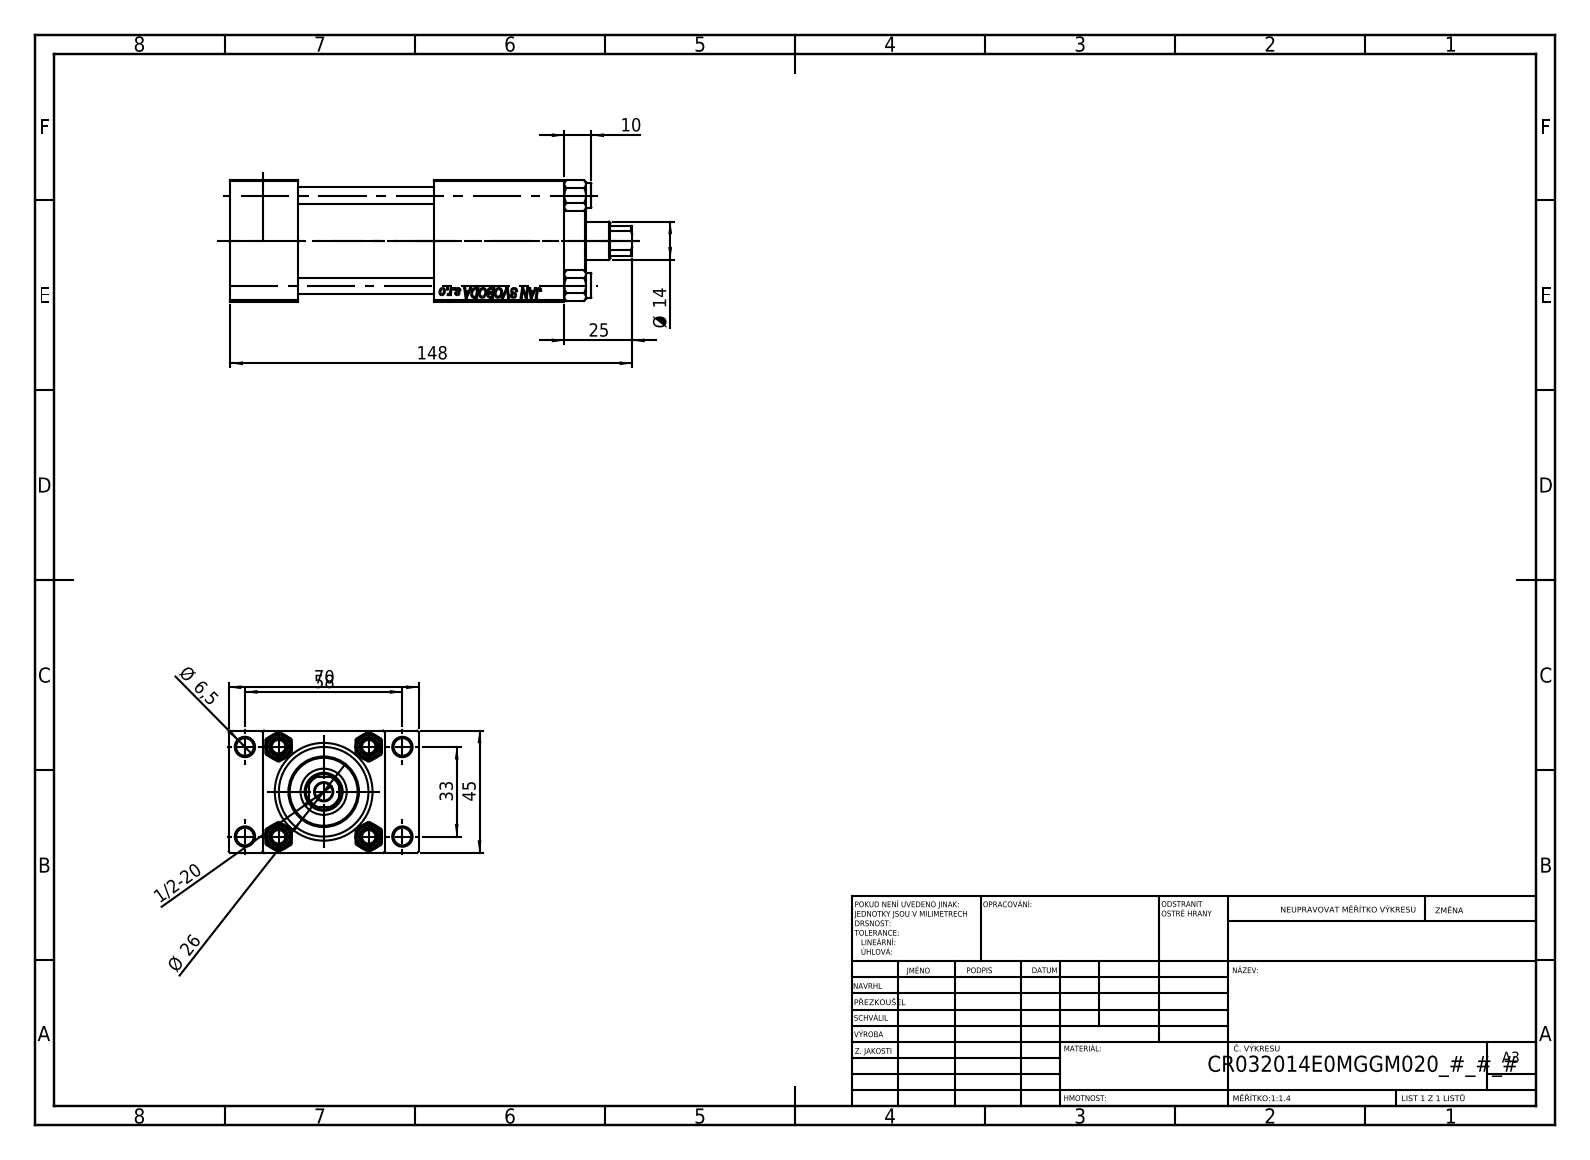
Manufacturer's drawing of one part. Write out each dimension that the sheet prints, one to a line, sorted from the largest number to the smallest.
148
70
58
45
33
Ø 26
25
Ø 14
10
Ø 6,5
1/2-20
